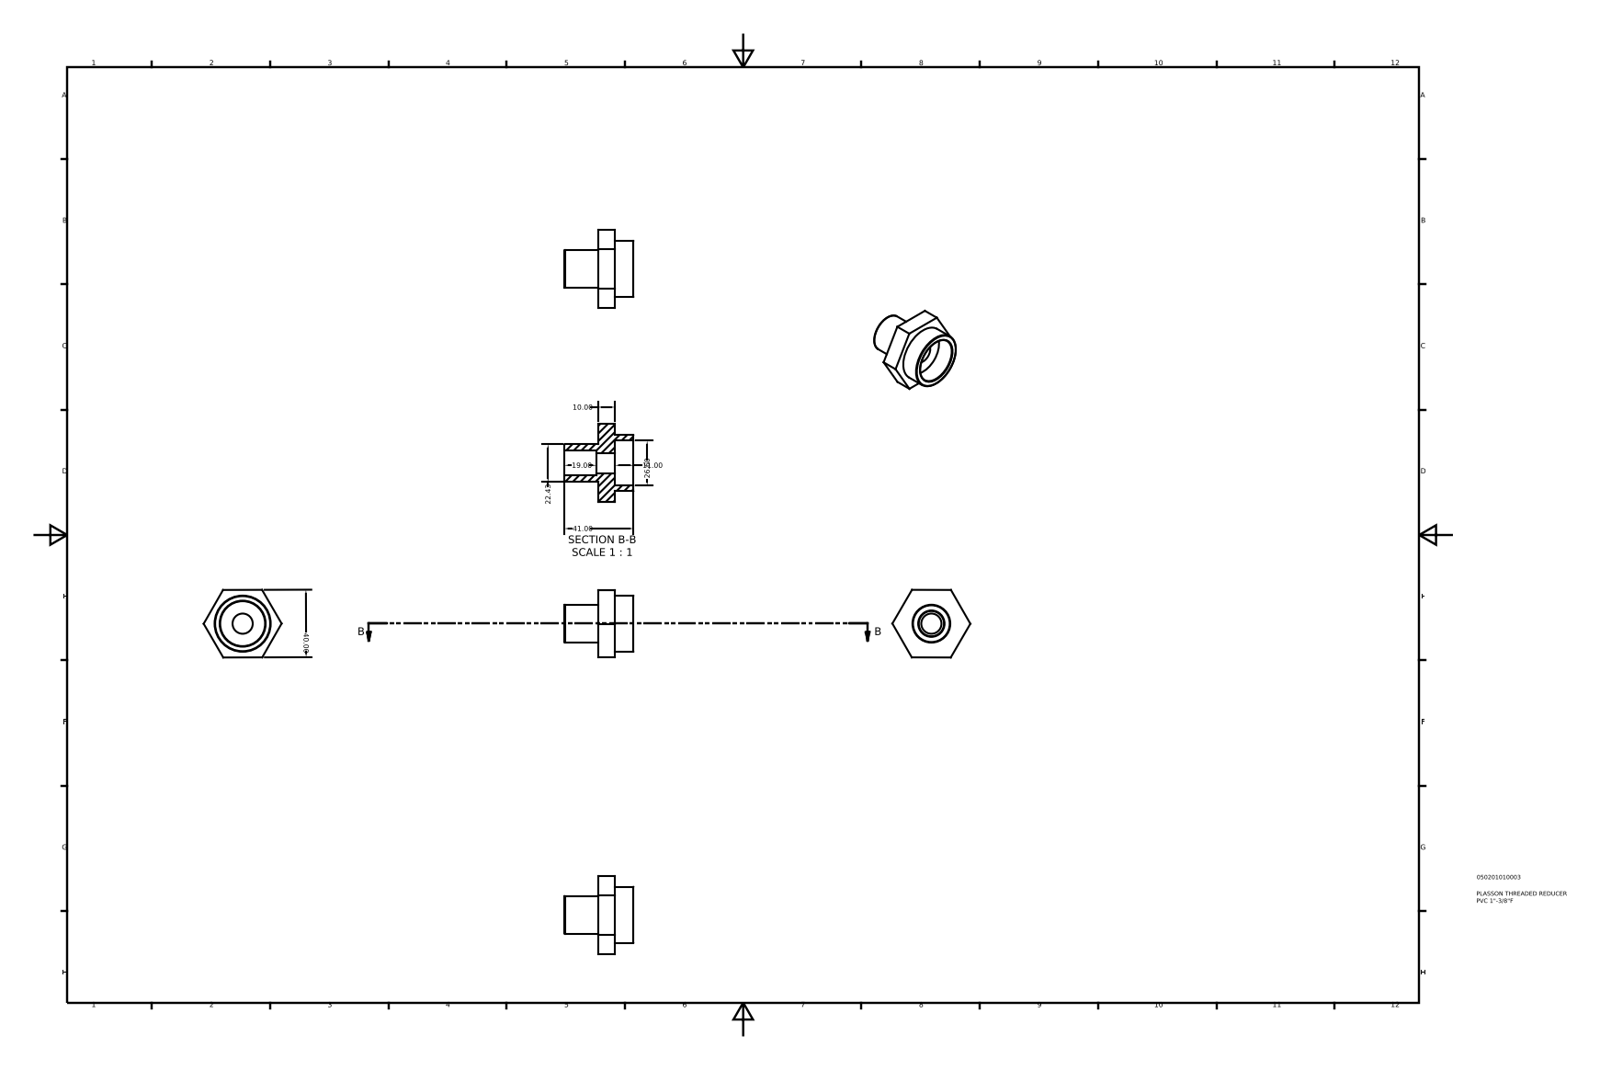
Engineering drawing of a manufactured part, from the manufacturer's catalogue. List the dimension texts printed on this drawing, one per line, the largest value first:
41.00
40.00
26.60
22.43
19.00
11.00
10.00
